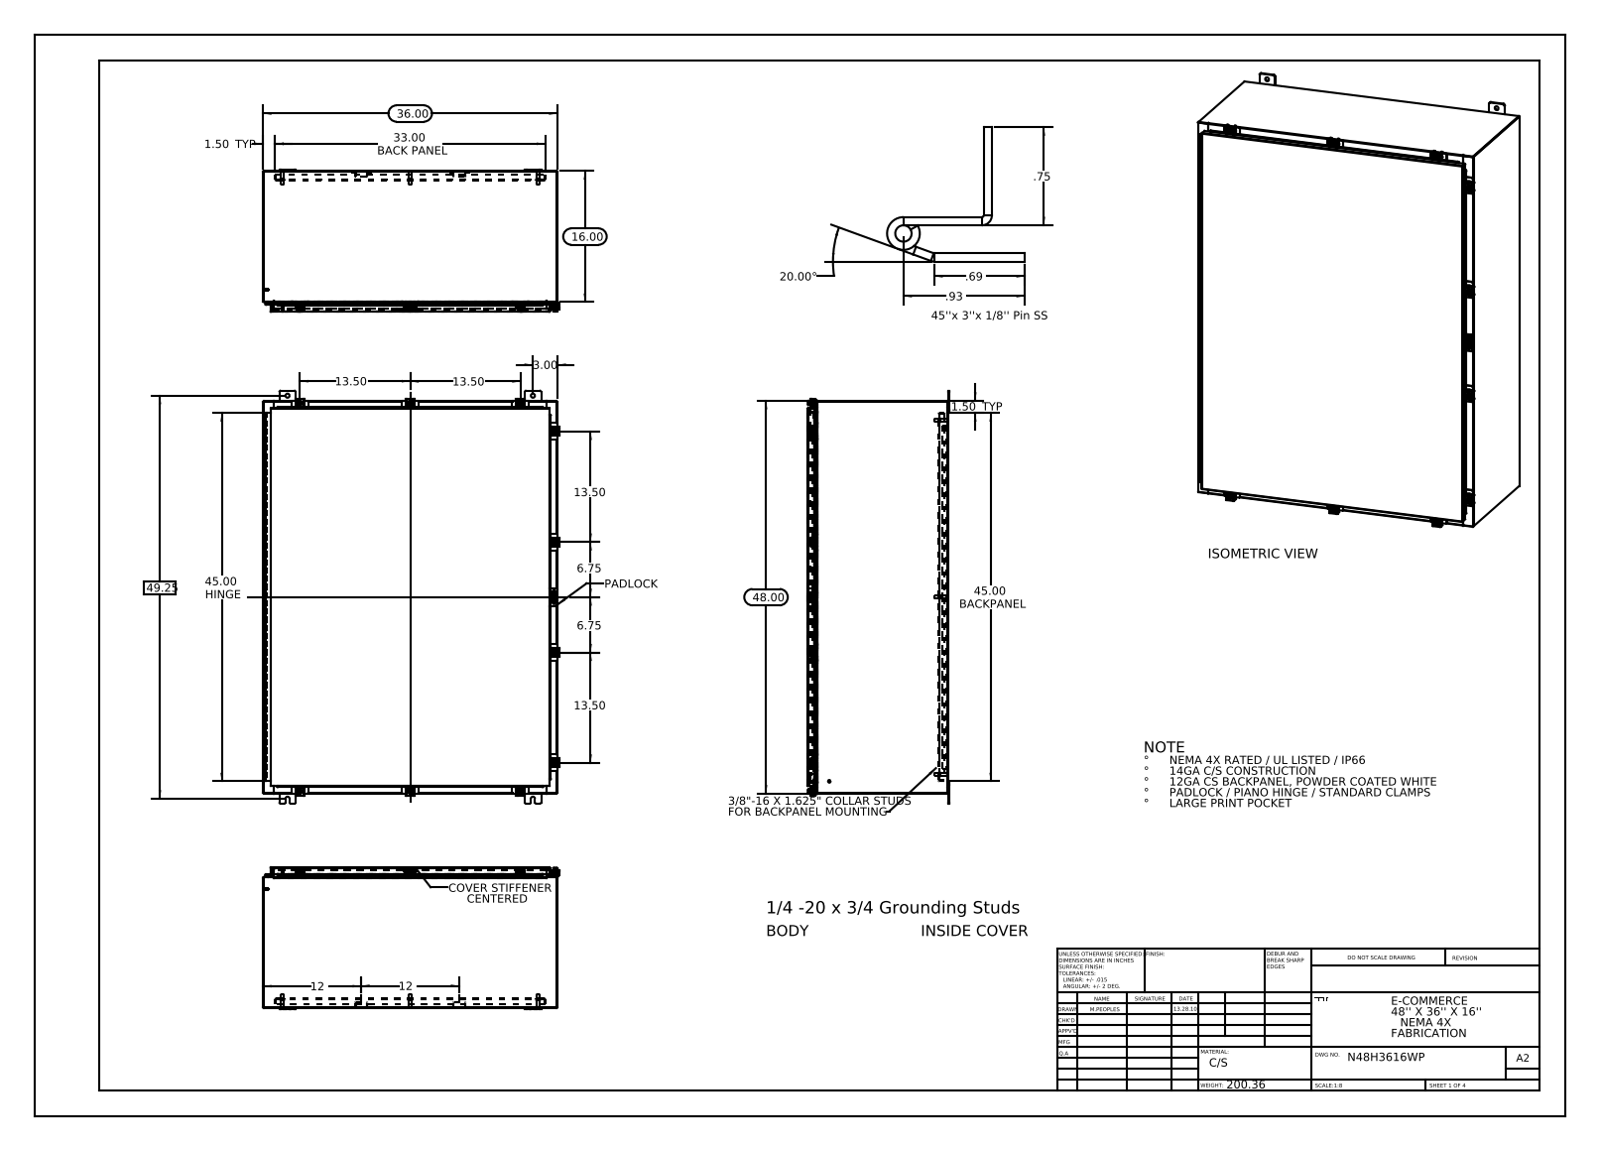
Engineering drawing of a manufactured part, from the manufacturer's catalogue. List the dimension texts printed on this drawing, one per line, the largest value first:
49.25
48.00
45.00 HINGE
45.00 BACKPANEL
36.00
33.00 BACK PANEL
20.00°
16.00
13.50
13.50
13.50
13.50
12
12
6.75
6.75
3.00
1.50 TYP
1.50 TYP
.93
.75
.69
